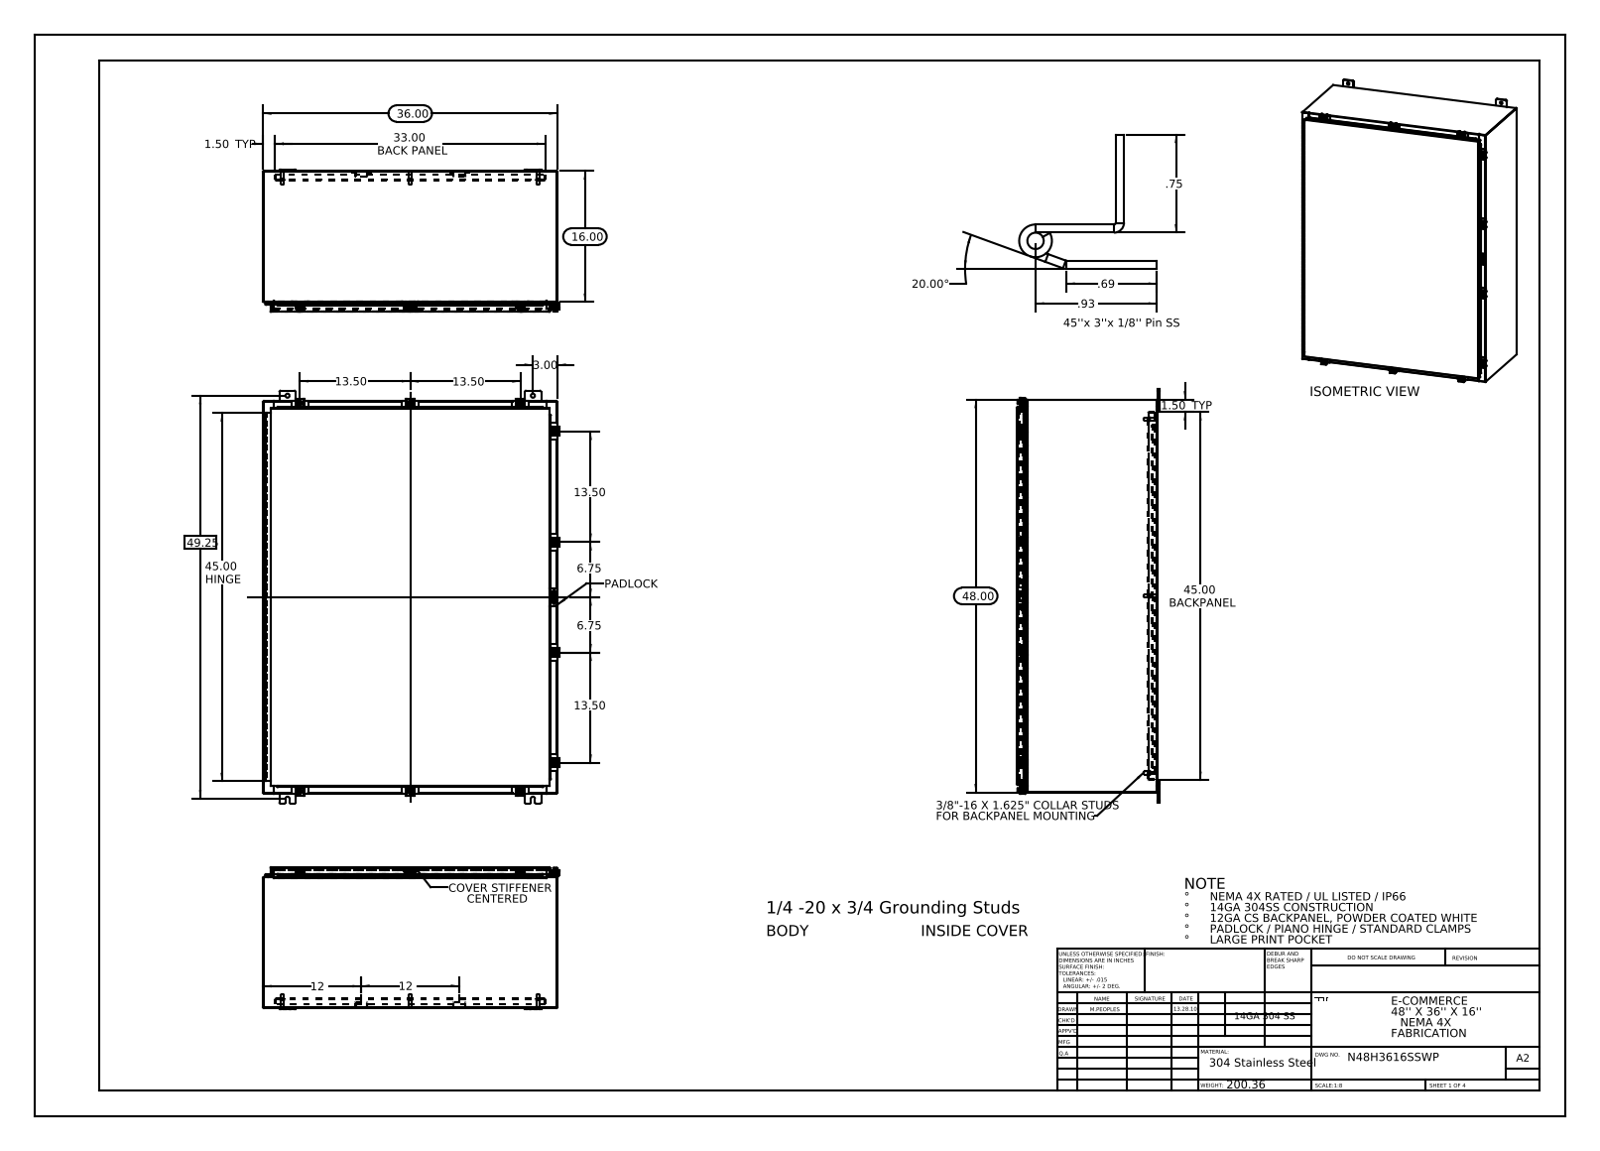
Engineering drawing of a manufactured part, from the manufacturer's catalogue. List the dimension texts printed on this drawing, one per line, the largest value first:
49.25
48.00
45.00 HINGE
45.00 BACKPANEL
36.00
33.00 BACK PANEL
20.00°
16.00
13.50
13.50
13.50
13.50
12
12
6.75
6.75
3.00
1.50 TYP
1.50 TYP
.93
.75
.69
